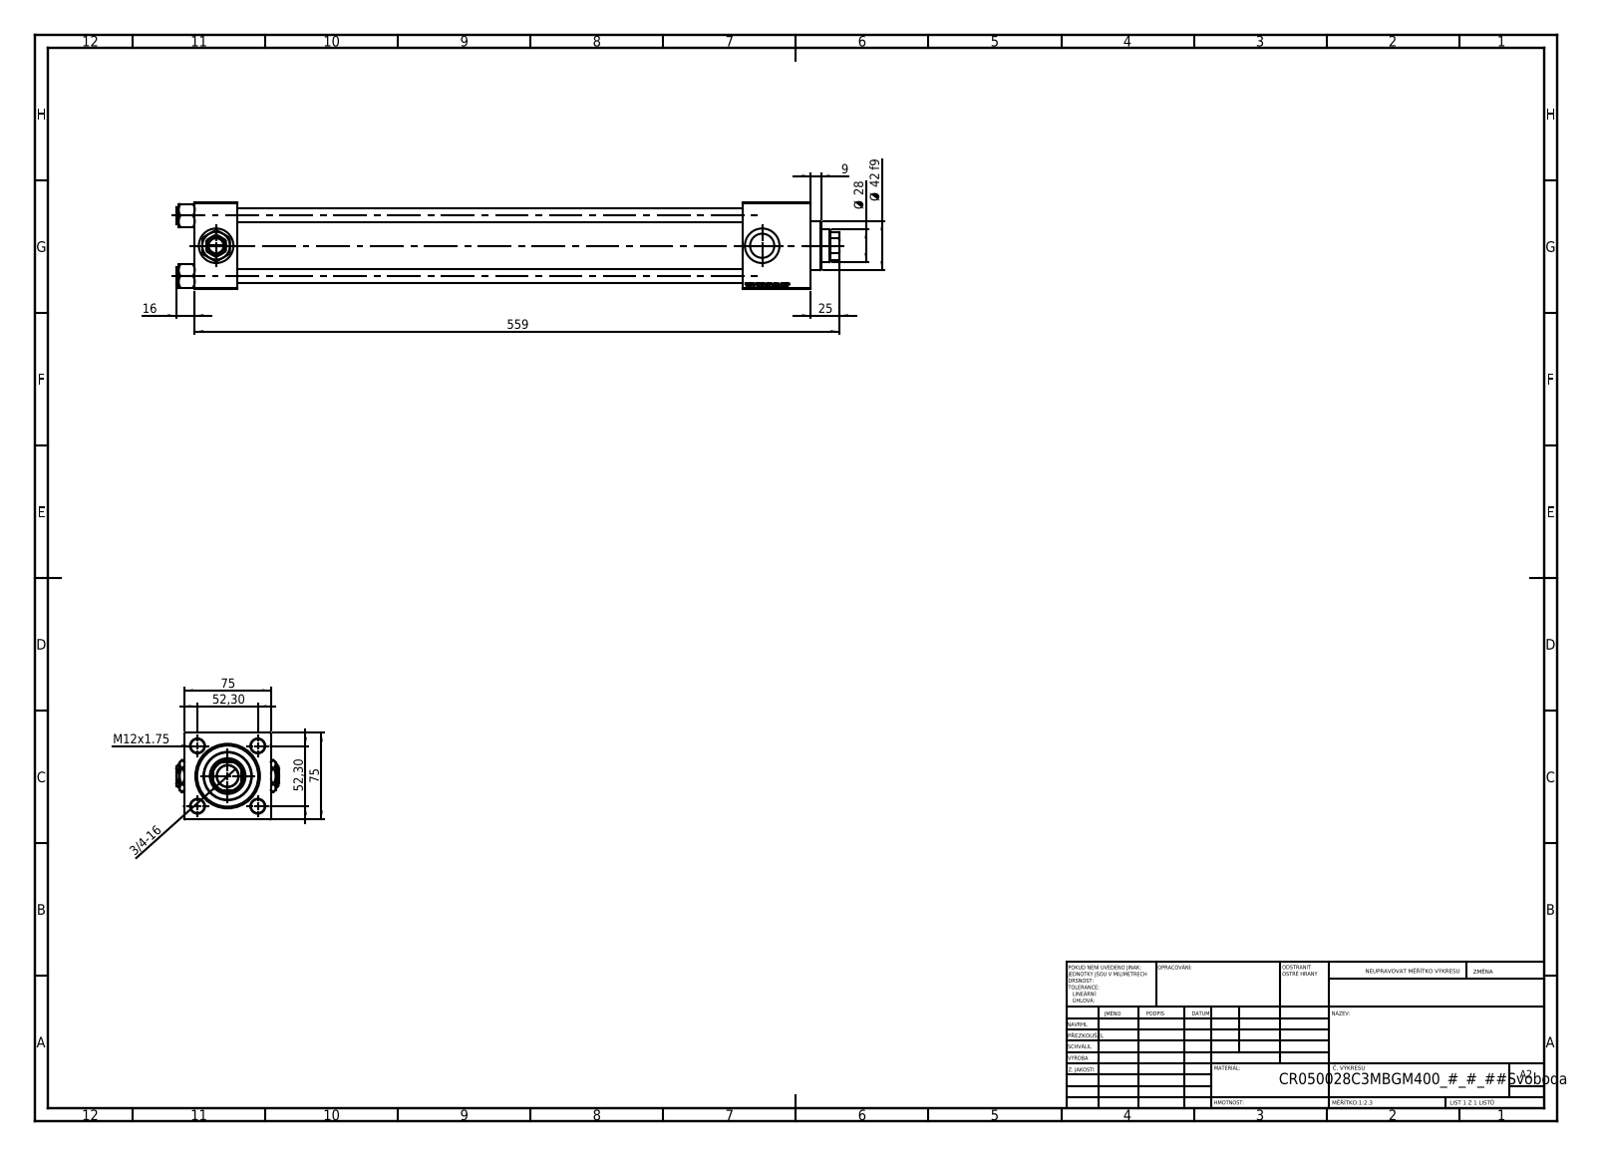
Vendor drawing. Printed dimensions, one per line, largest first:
559
75
75
52,30
52,30
Ø 42 f9
Ø 28
25
16
M12x1.75
9
3/4-16
